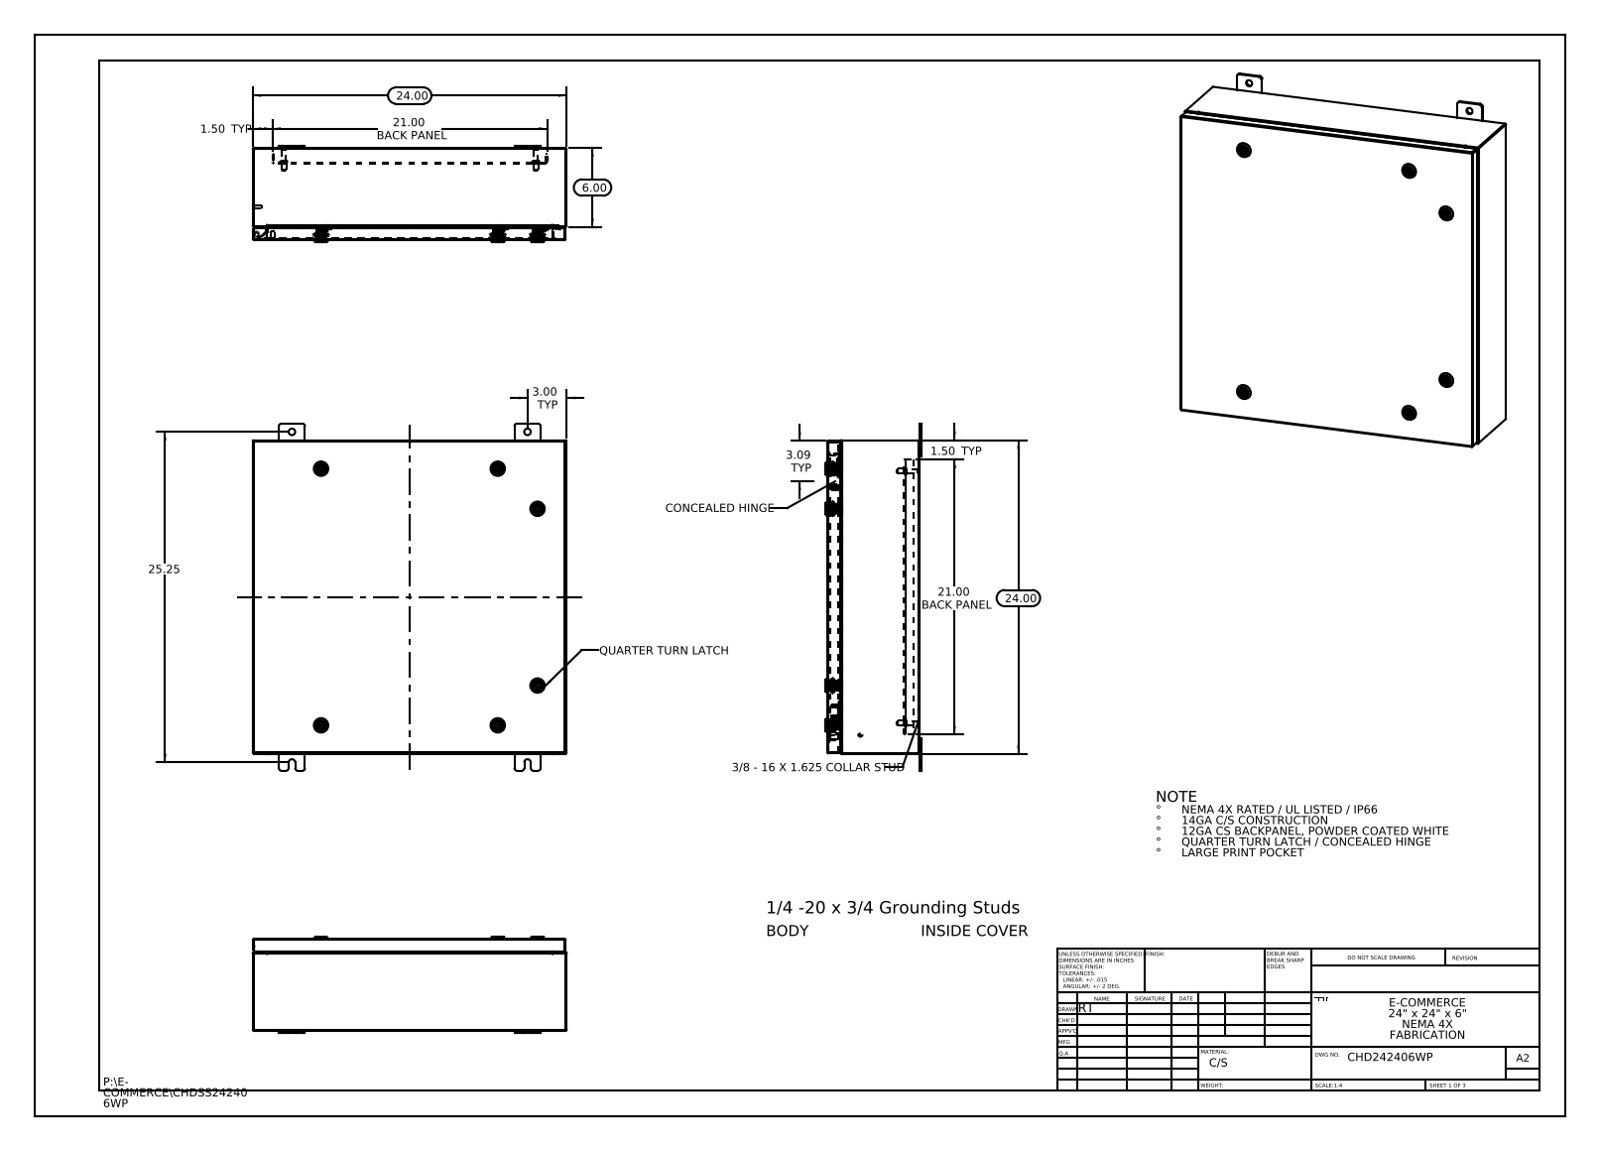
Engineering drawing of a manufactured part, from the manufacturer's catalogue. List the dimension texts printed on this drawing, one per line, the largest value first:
25.25
24.00
24.00
21.00 BACK PANEL
21.00 BACK PANEL
6.00
3.09 TYP
3.00 TYP
1.50 TYP
1.50 TYP
